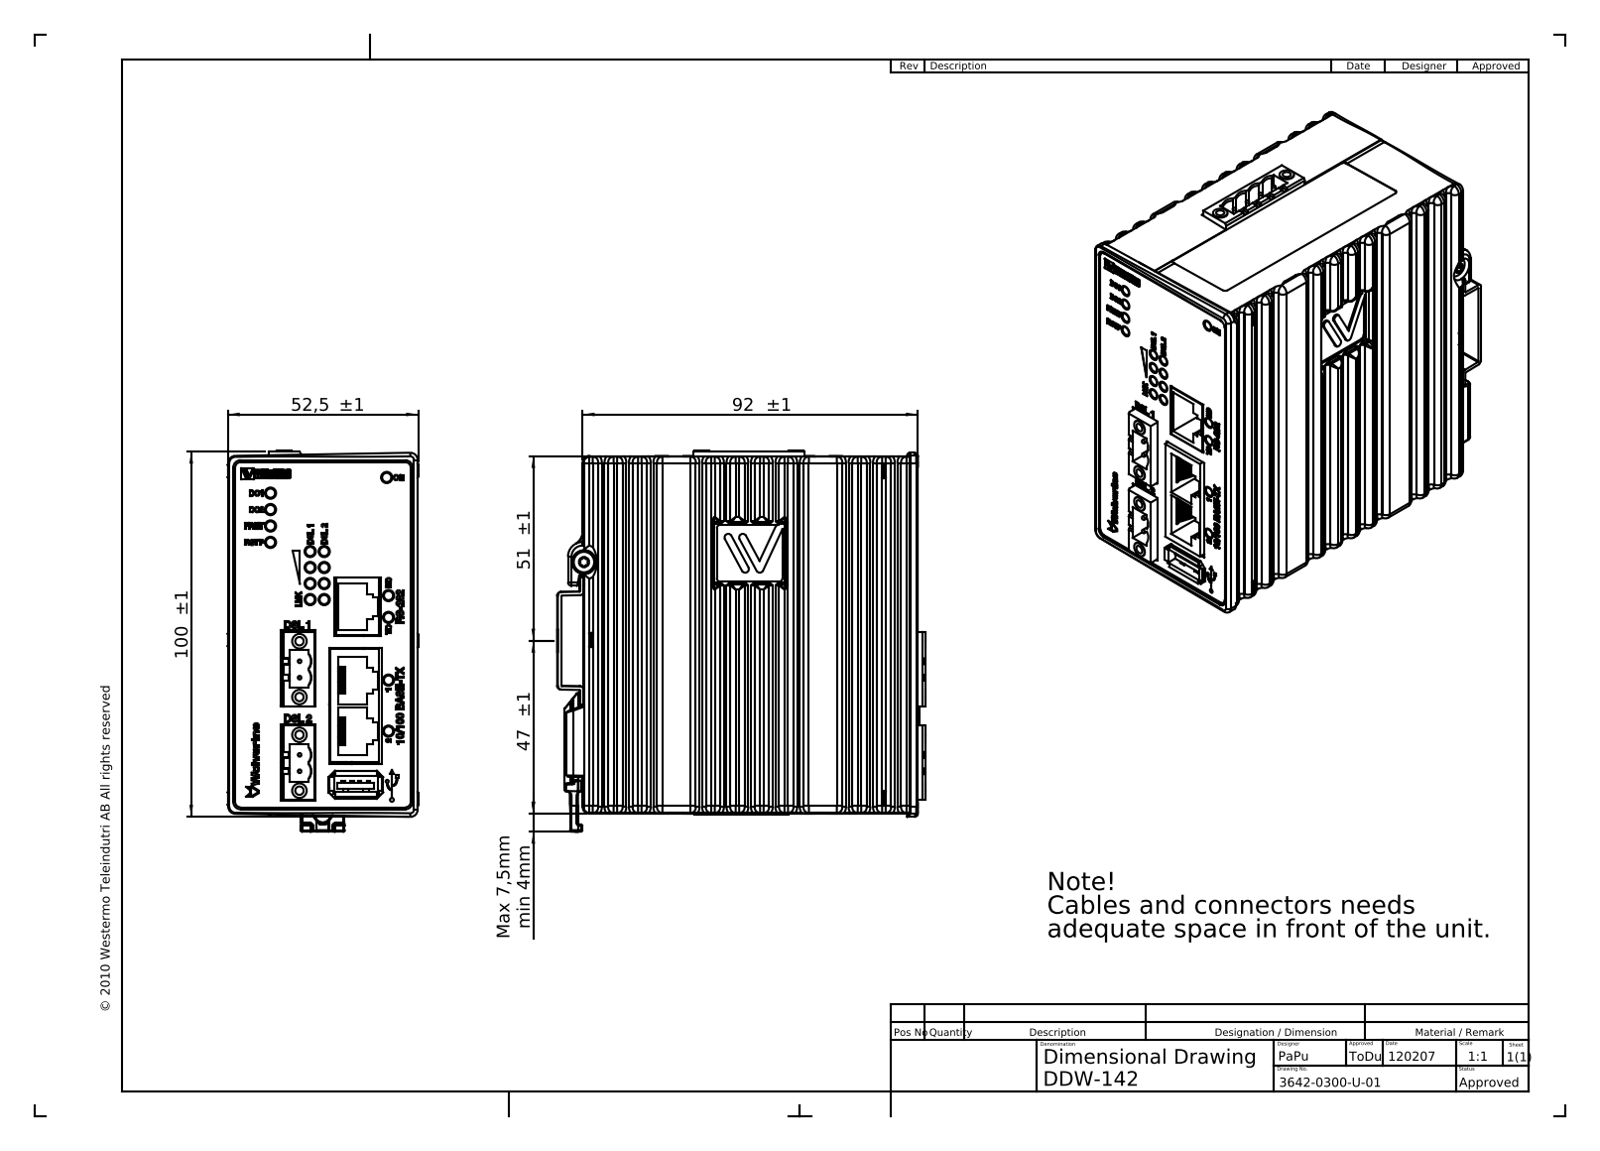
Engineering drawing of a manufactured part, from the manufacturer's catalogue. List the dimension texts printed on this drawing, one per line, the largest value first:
100 ±1
92 ±1
52,5 ±1
51 ±1
47 ±1
Max 7,5mm min 4mm
